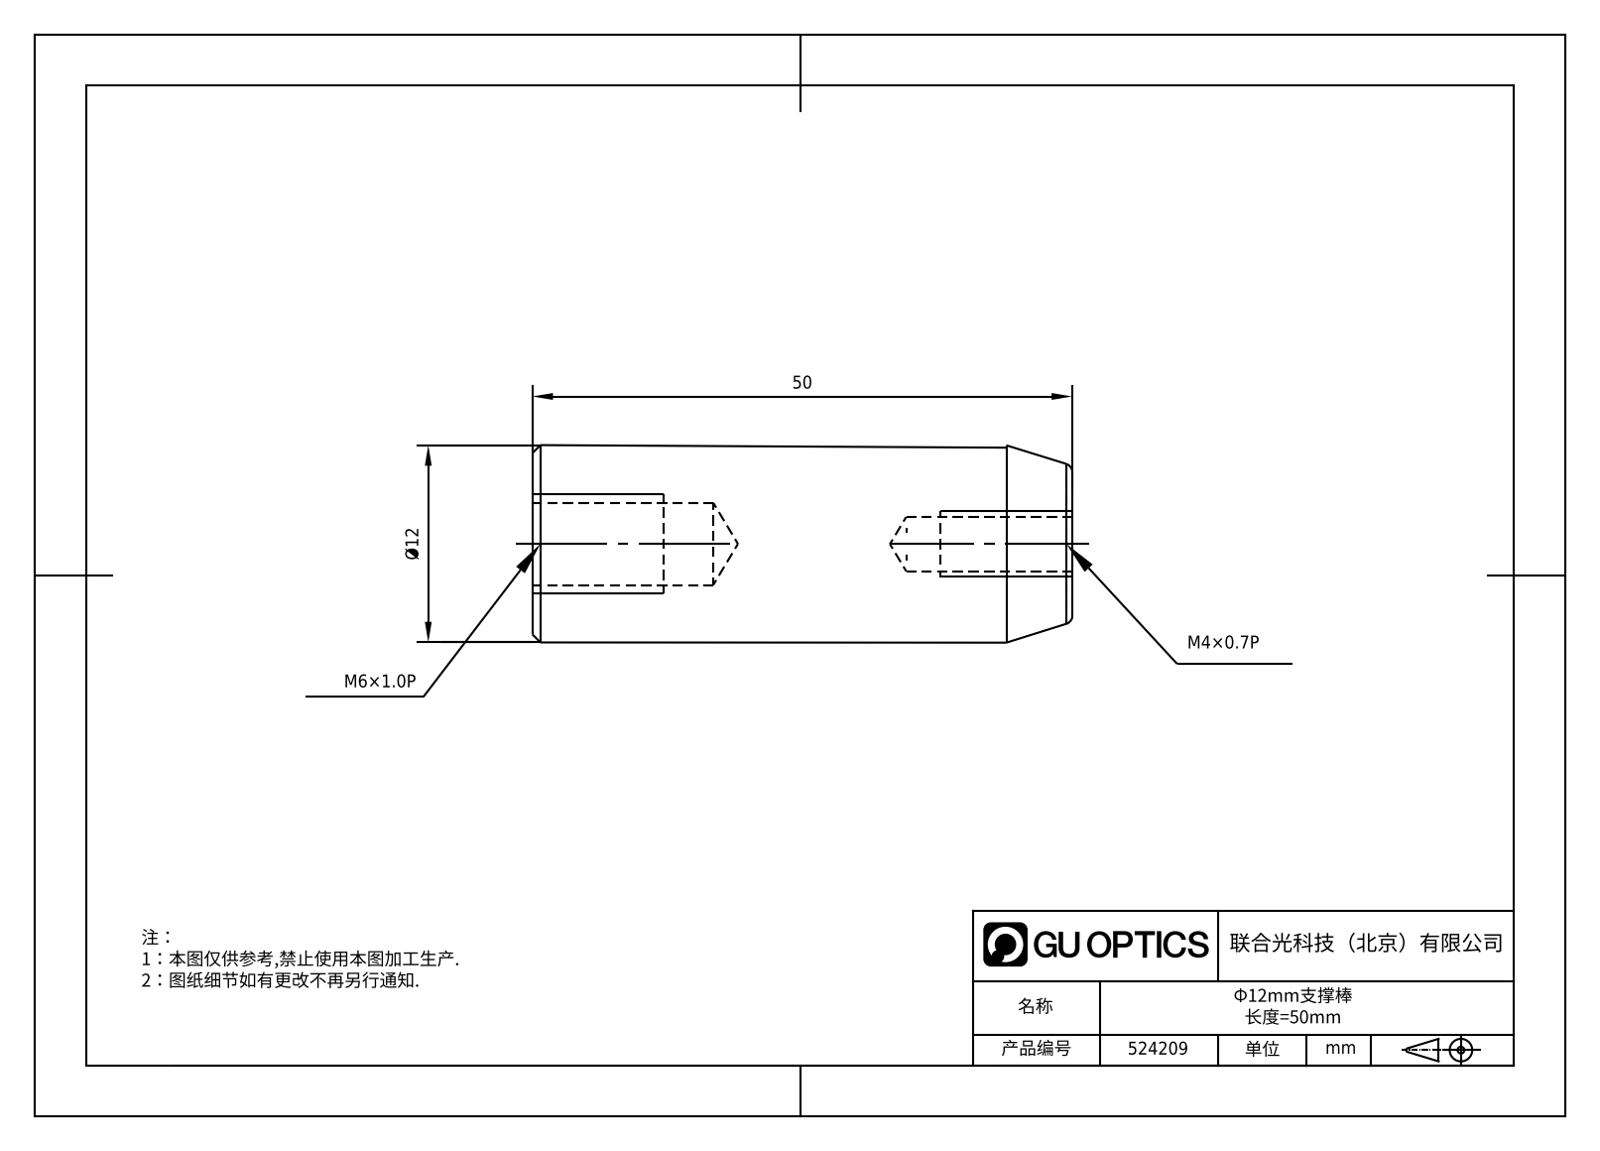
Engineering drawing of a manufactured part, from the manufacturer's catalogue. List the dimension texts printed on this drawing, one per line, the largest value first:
50
Ø12
